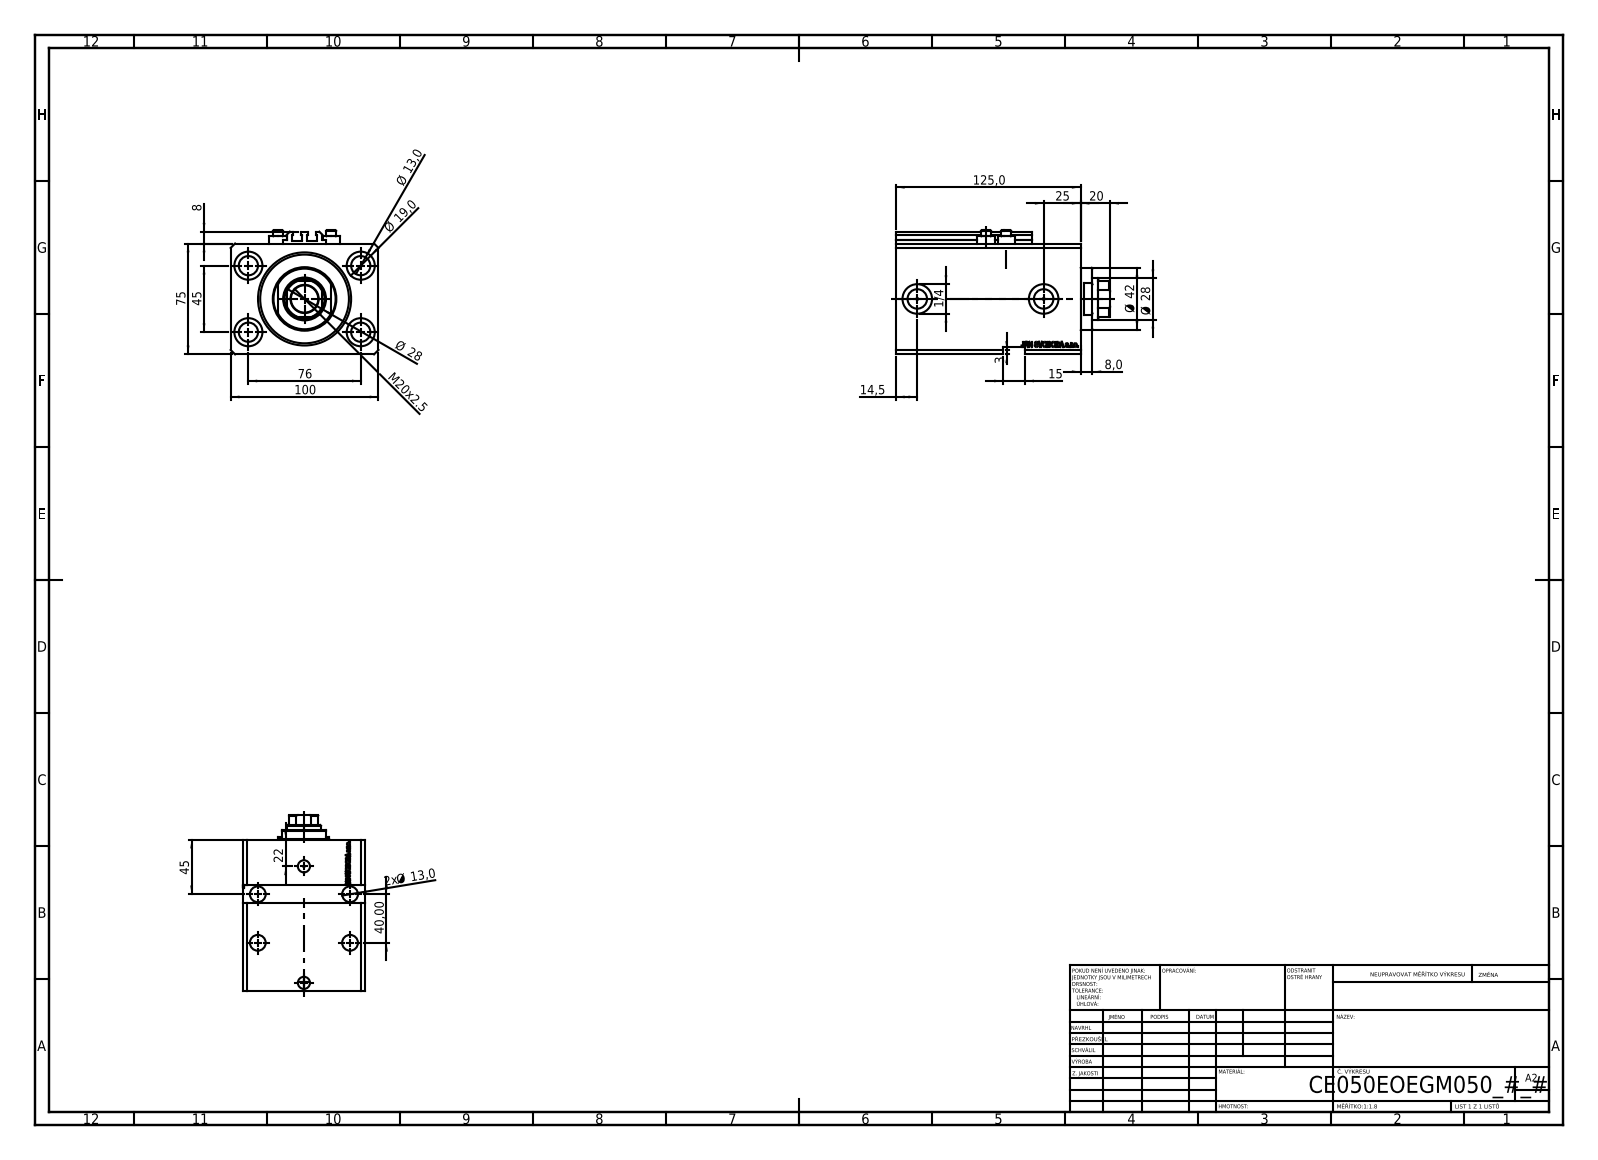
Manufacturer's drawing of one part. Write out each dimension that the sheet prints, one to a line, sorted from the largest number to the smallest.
125,0
100
76
75
45
45
Ø 42
40,00
Ø 28
Ø 28
25
22
M20x2.5
20
Ø 19,0
15
14,5
Ø 13,0
2x Ø 13,0
8
8,0
3
1/4
